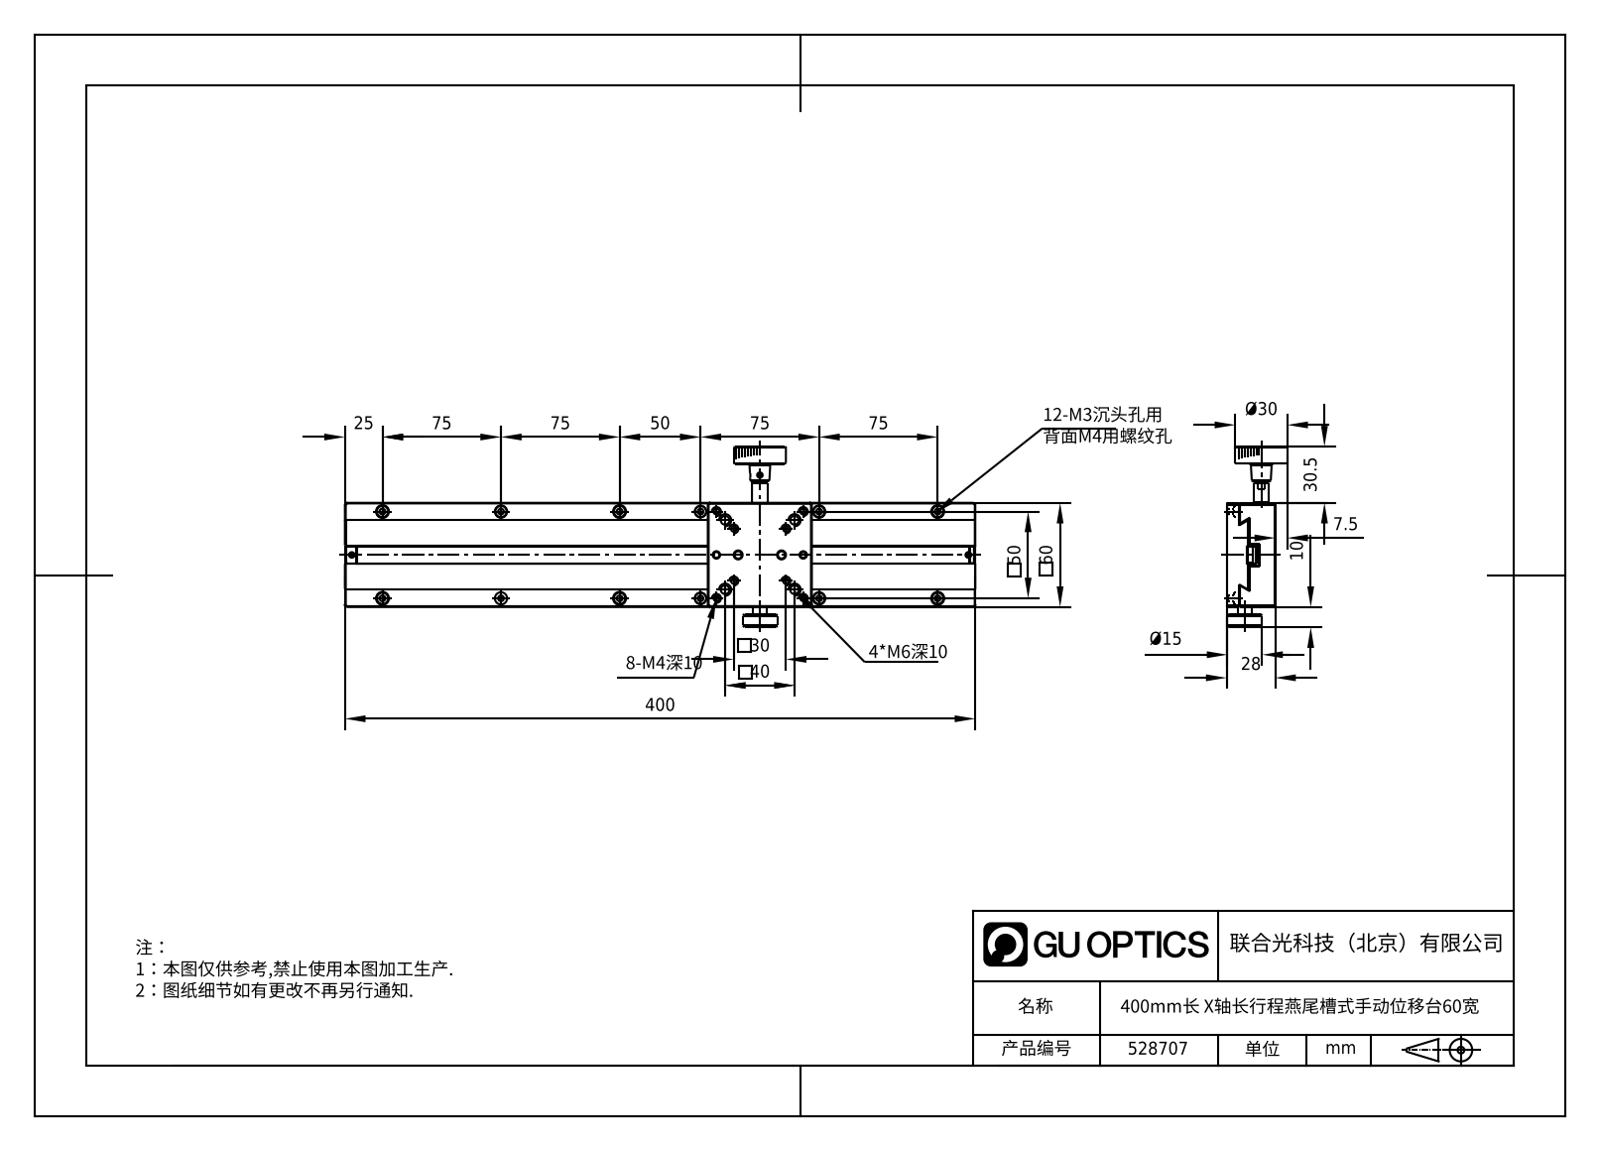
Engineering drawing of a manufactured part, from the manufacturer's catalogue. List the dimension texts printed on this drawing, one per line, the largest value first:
400
75
75
75
75
60
50
50
40
30.5
Ø30
30
28
25
Ø15
10
7.5
